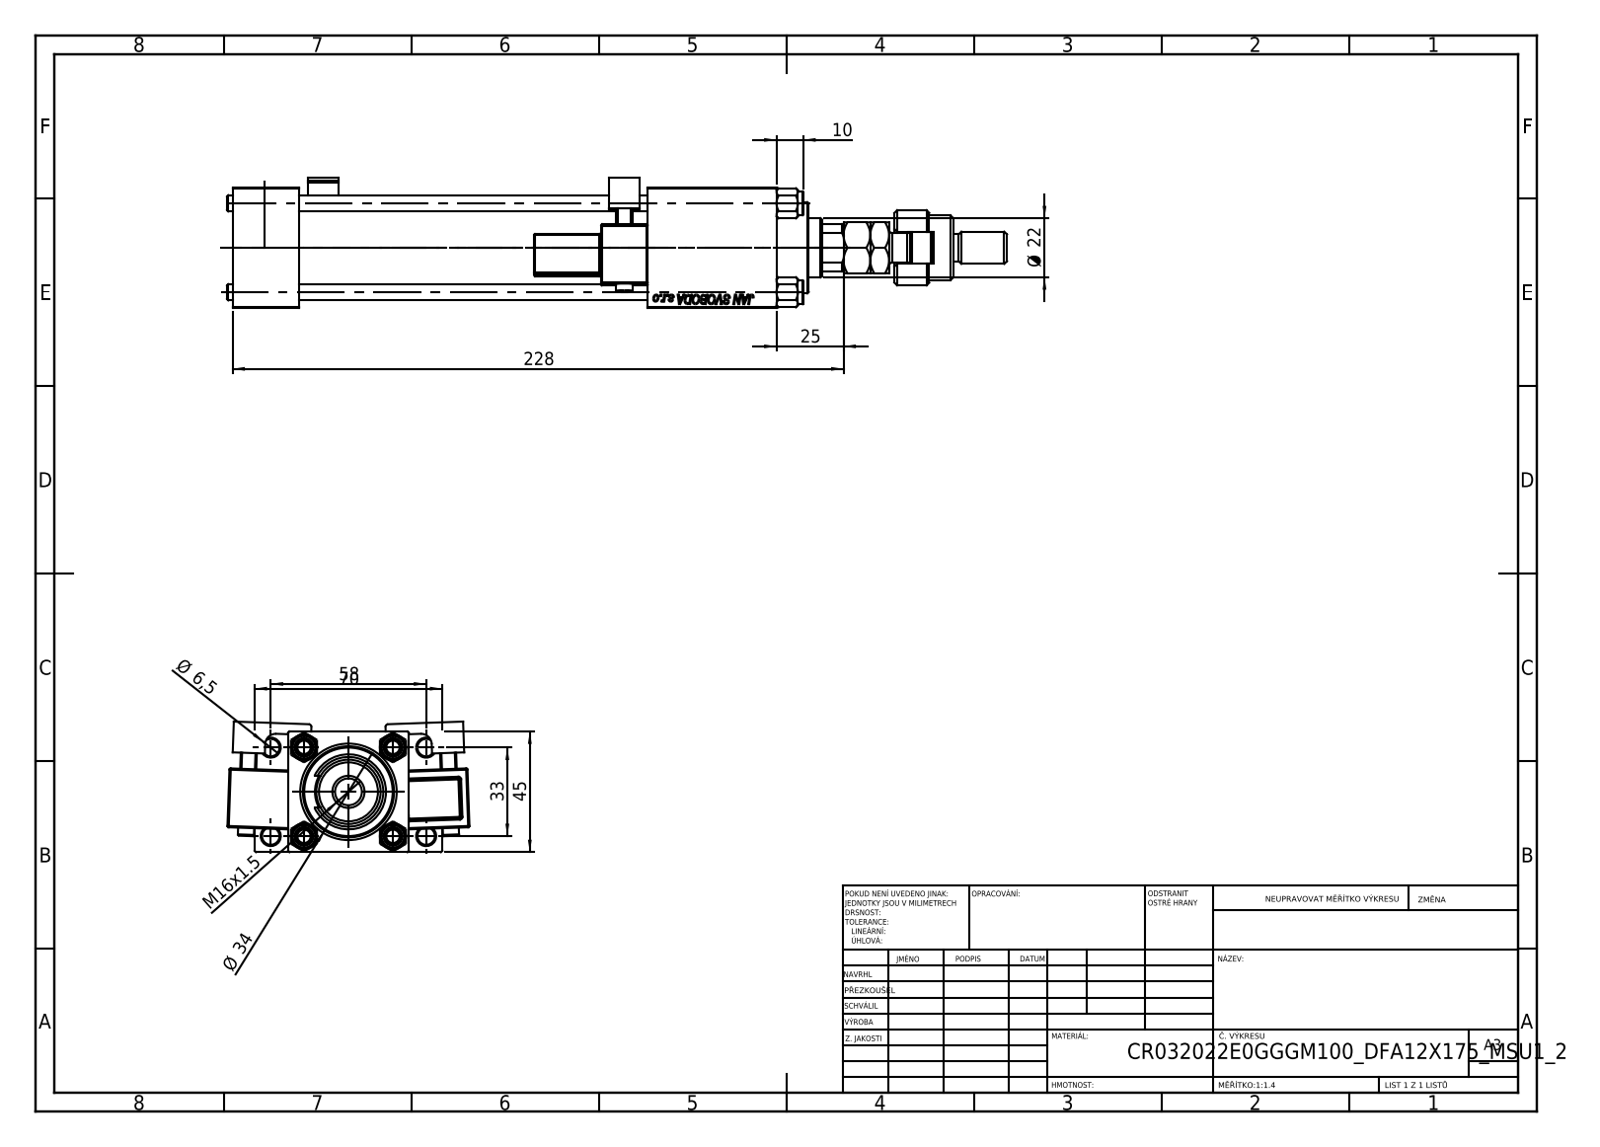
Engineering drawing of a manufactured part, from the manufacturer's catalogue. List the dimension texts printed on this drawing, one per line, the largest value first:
228
70
58
45
Ø 34
33
25
Ø 22
M16x1.5
10
Ø 6,5
